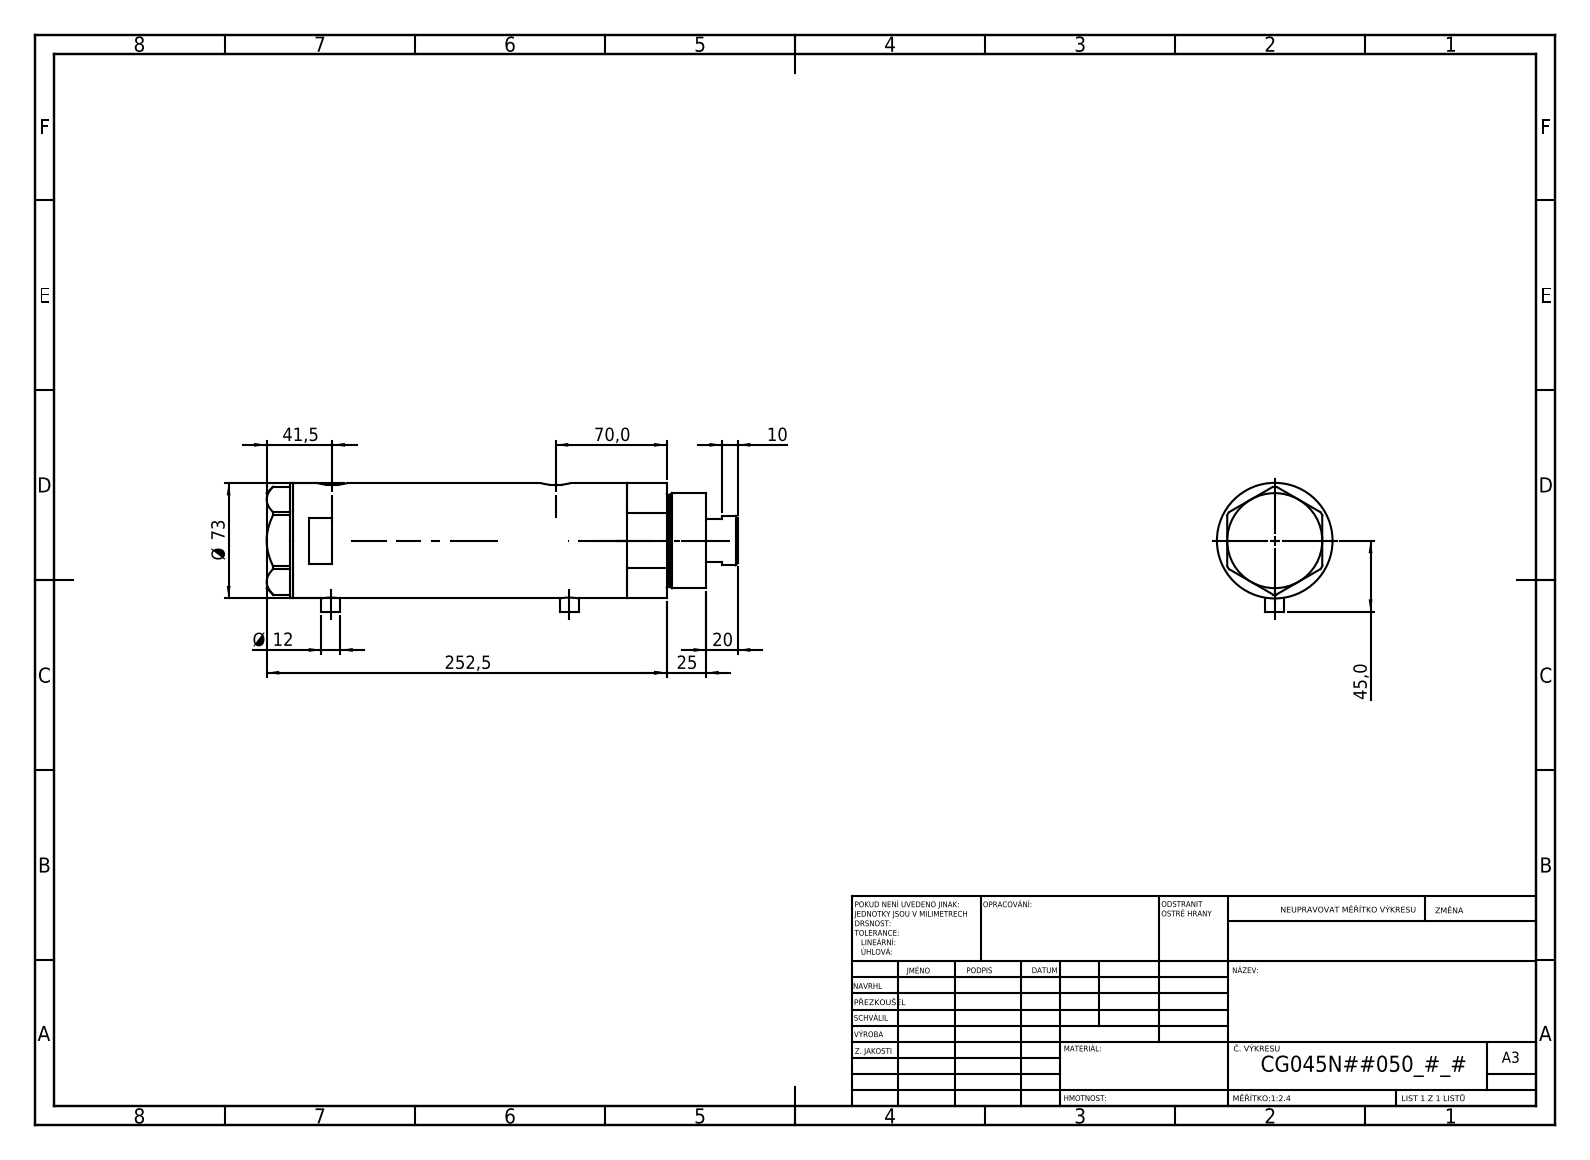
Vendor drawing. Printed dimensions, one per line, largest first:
252,5
Ø 73
70,0
45,0
41,5
25
20
Ø 12
10
